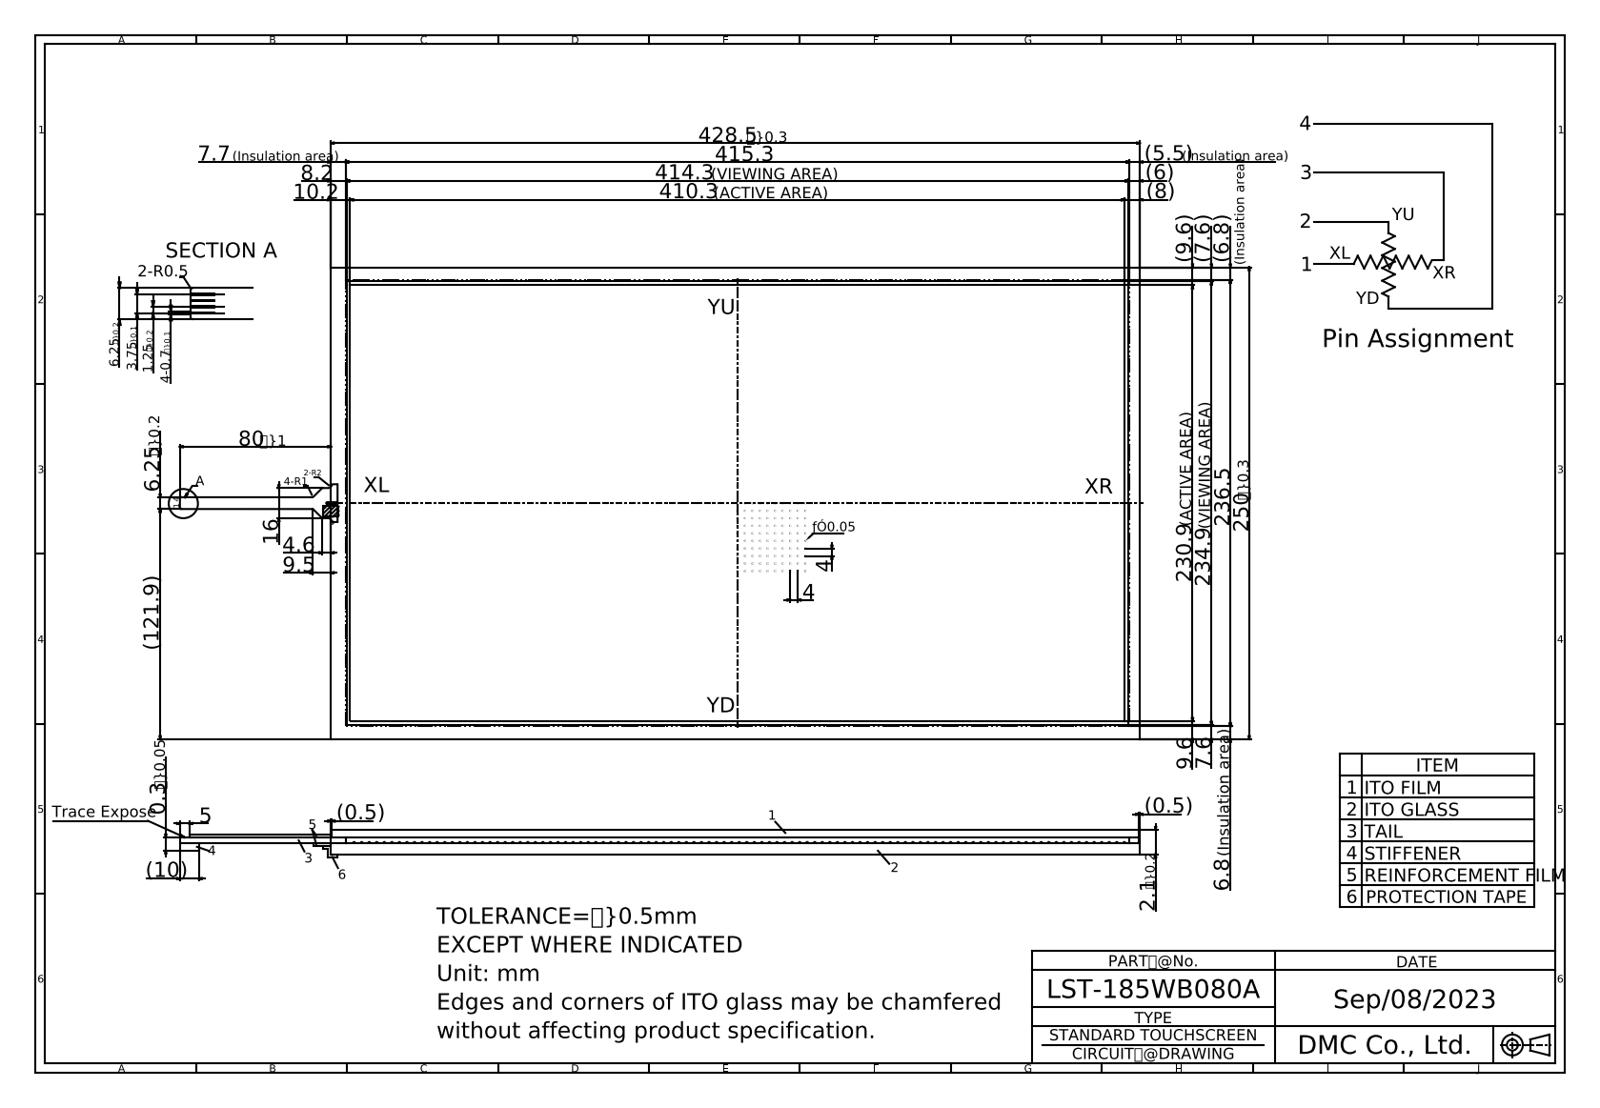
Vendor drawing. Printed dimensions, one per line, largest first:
428.5
415.3
414.3 {\H0.75x;(VIEWING AREA)}
410.3 {\H0.75x;(ACTIVE AREA)}
250.0
236.5
234.9 {\H0.75x;(VIEWING AREA)}
230.9 {\H0.75x;(ACTIVE AREA)}
(121.9)
80.0
16
10.2
(10)
(9.6)
9.6
9.5
8.2
(8)
7.7 {\H0.625x;(Insulation area)}
(7.6)
7.6
(6.8)
6.7 {\H0.75x;(Insulation area)}
6.25
(6)
(5.5){\H0.625x;(Insulation area)}
5
4.6
4
4
2.1{\H0.625x;?}0.2}
{\H0.625x;4-0.7\H0.6x;?}0.1}
{\H0.625x;3.75\H0.6x;?}0.1}
{\H0.625x;1.25\H0.6x;?}0.2}
{\H0.625x;6.25\H0.6x;?}0.2}
(0.5)
(0.5)
0.3{\H0.7x;?}0.05}
